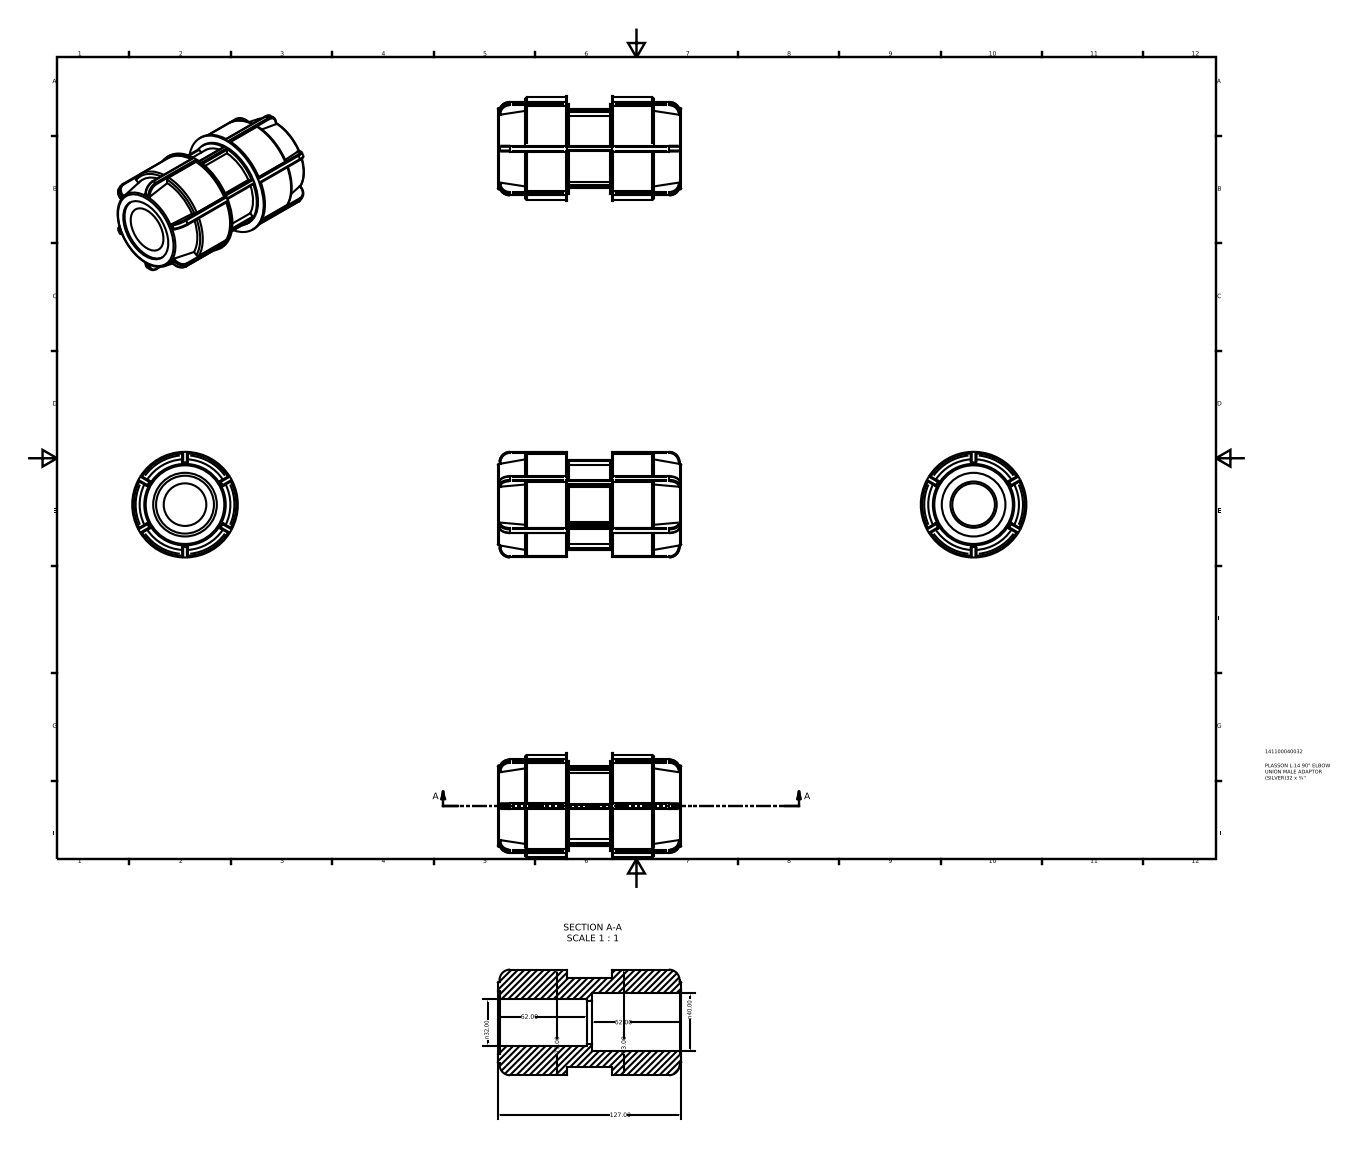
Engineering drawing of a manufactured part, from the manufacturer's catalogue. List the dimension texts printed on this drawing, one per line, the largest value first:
127.00
73.00
73.00
62.00
62.00
n40.00
n32.00
